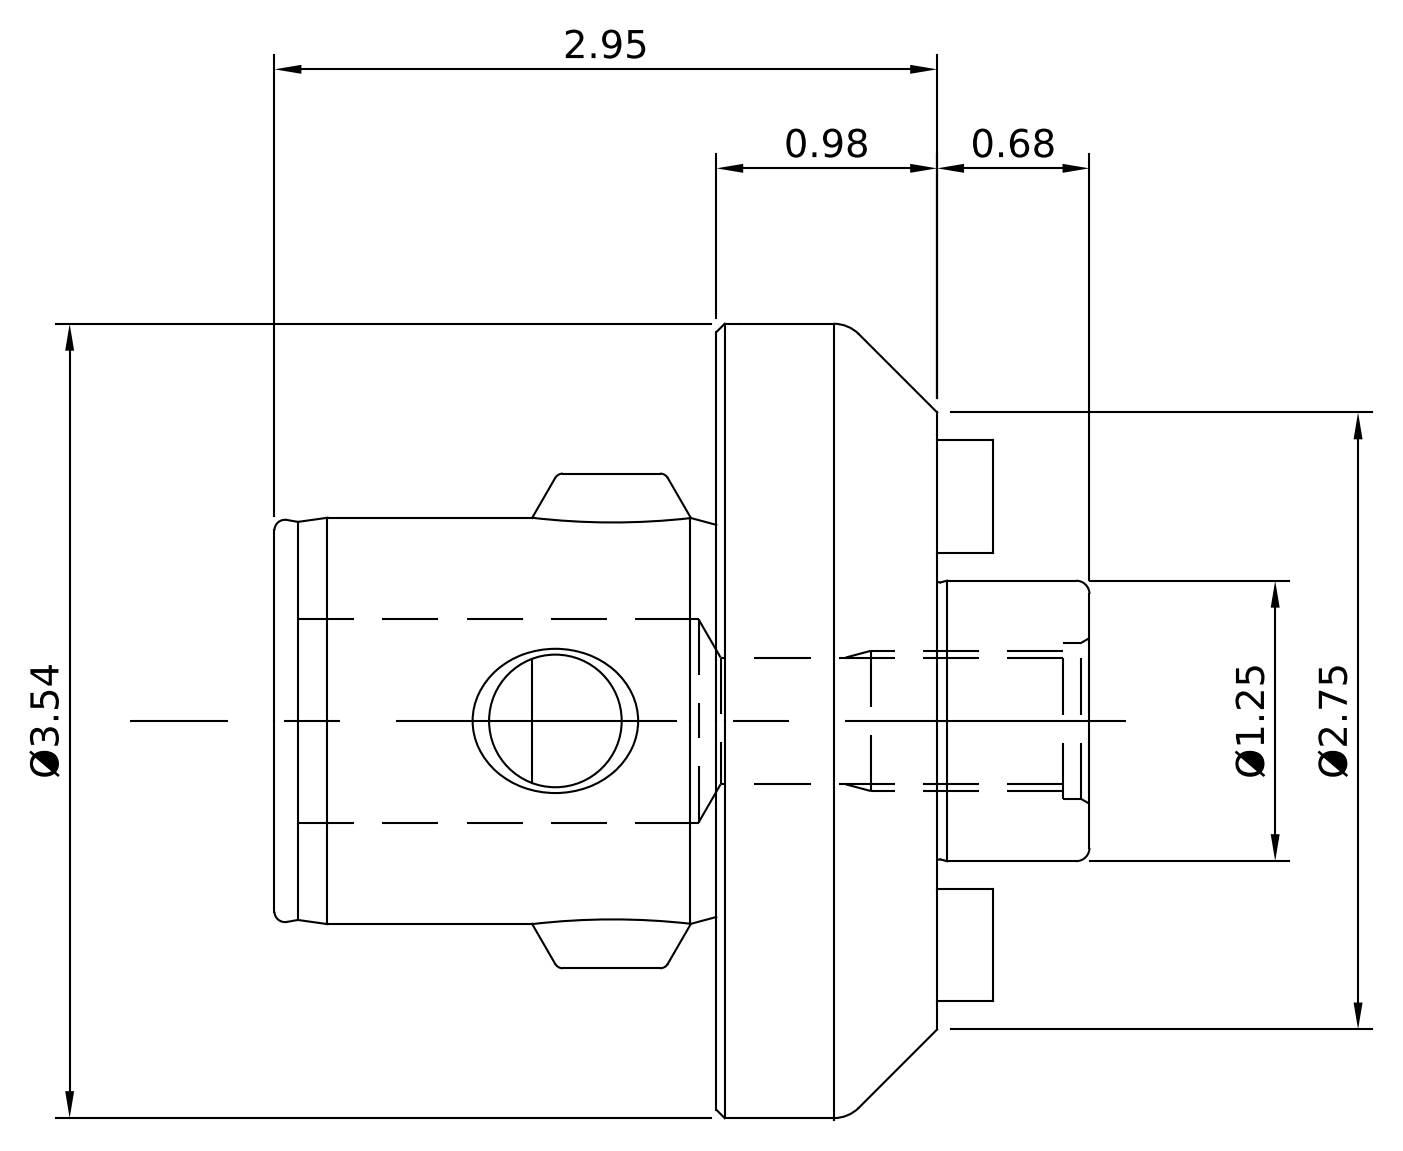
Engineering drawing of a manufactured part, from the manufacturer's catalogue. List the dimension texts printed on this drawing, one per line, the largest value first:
Ø3.54
2.95
Ø2.75
Ø1.25
0.98
0.68
